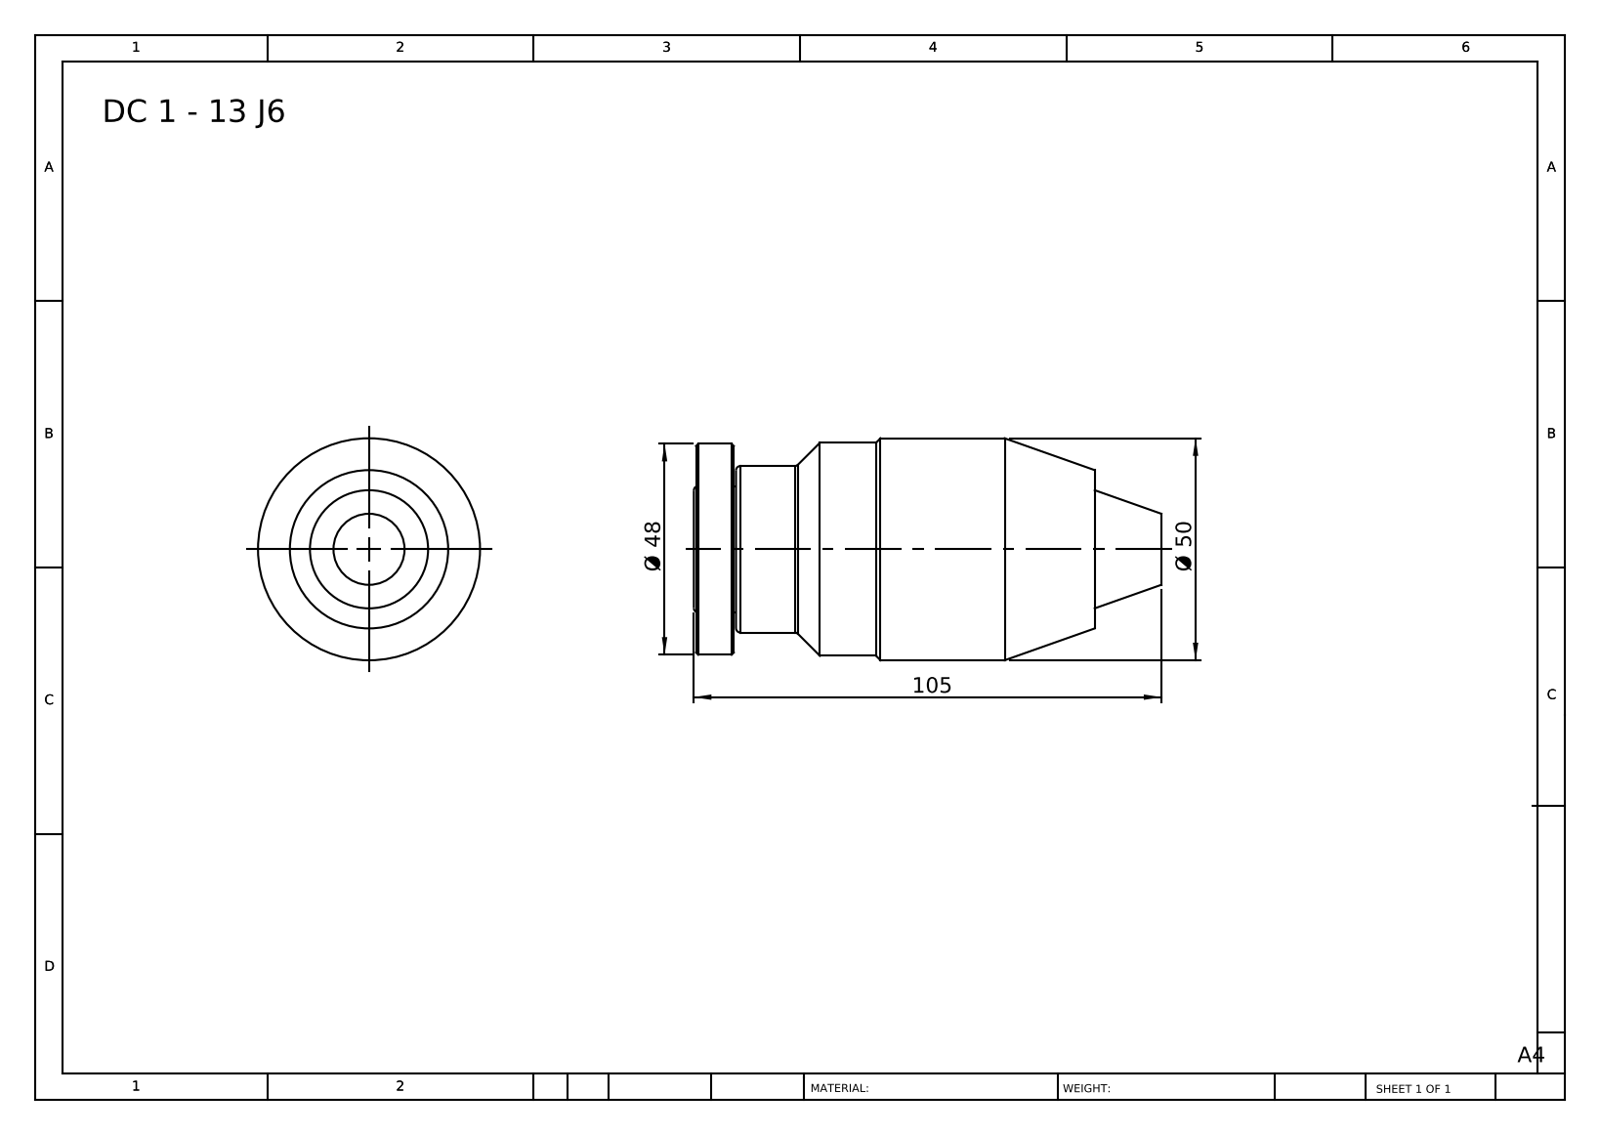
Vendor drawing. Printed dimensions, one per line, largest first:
105
Ø 50
Ø 48
